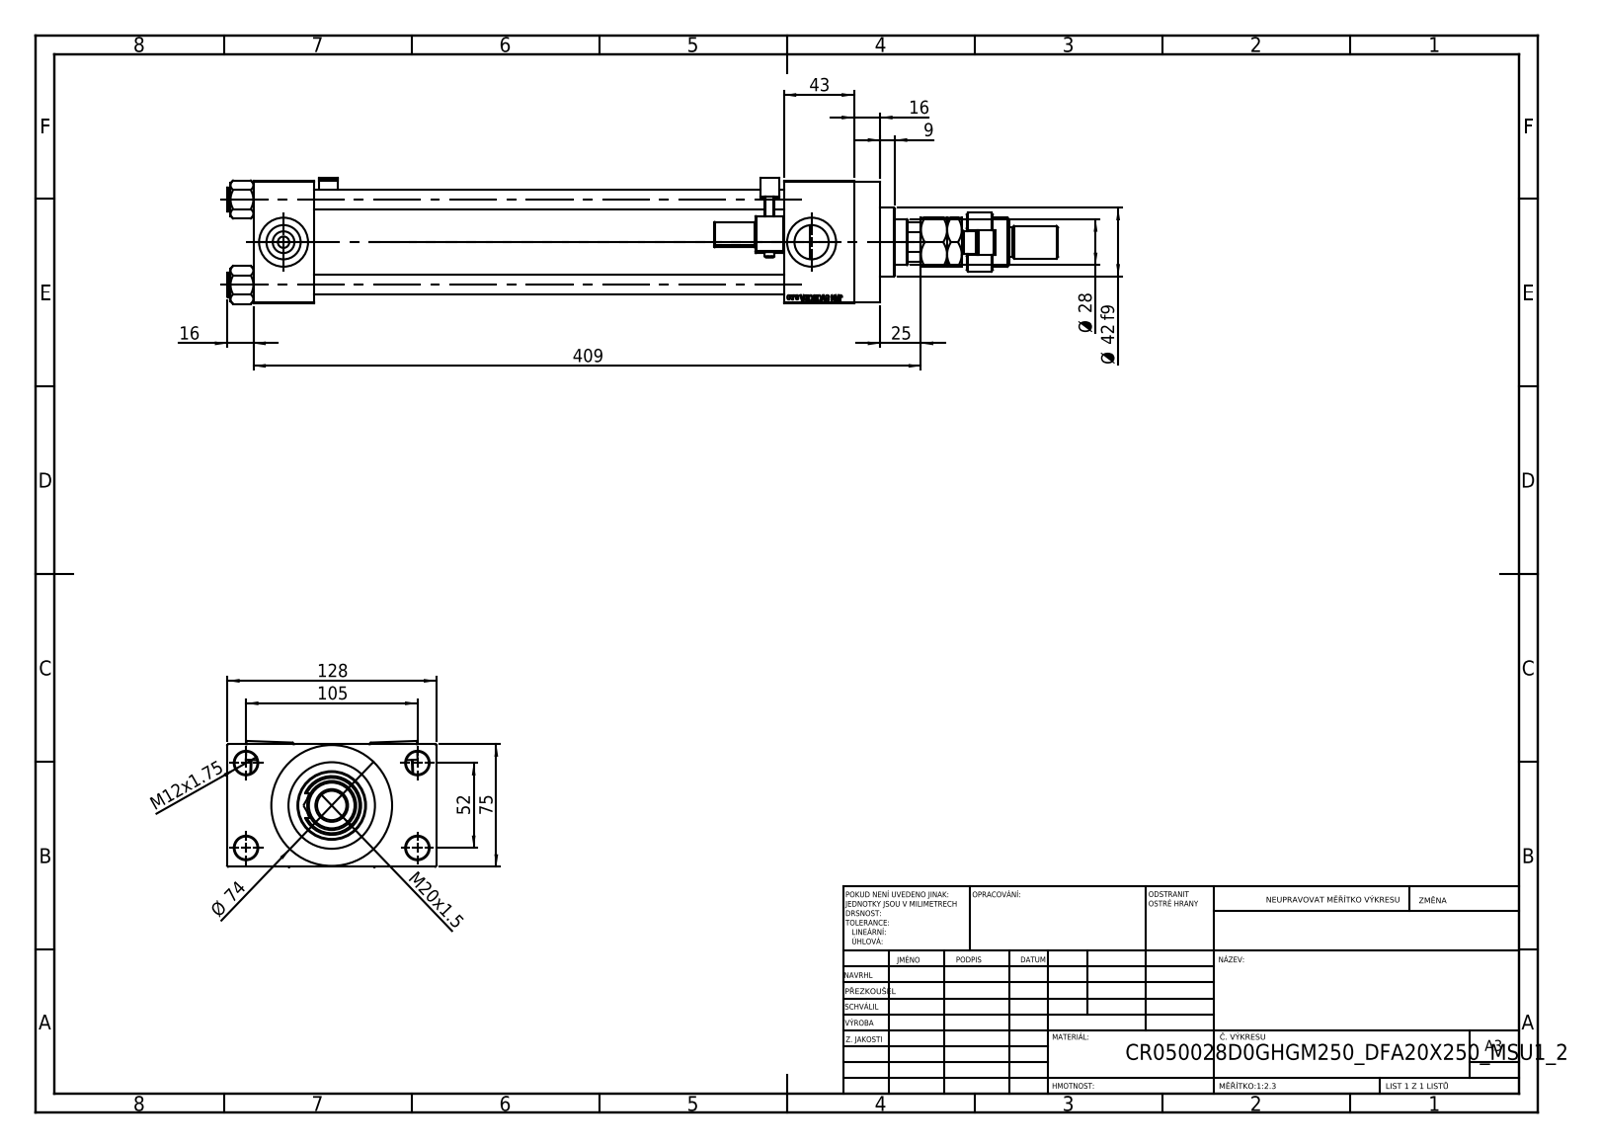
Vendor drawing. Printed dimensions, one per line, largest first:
409
128
105
75
Ø 74
52
43
Ø 42 f9
Ø 28
25
M20x1.5
16
16
M12x1.75
9
